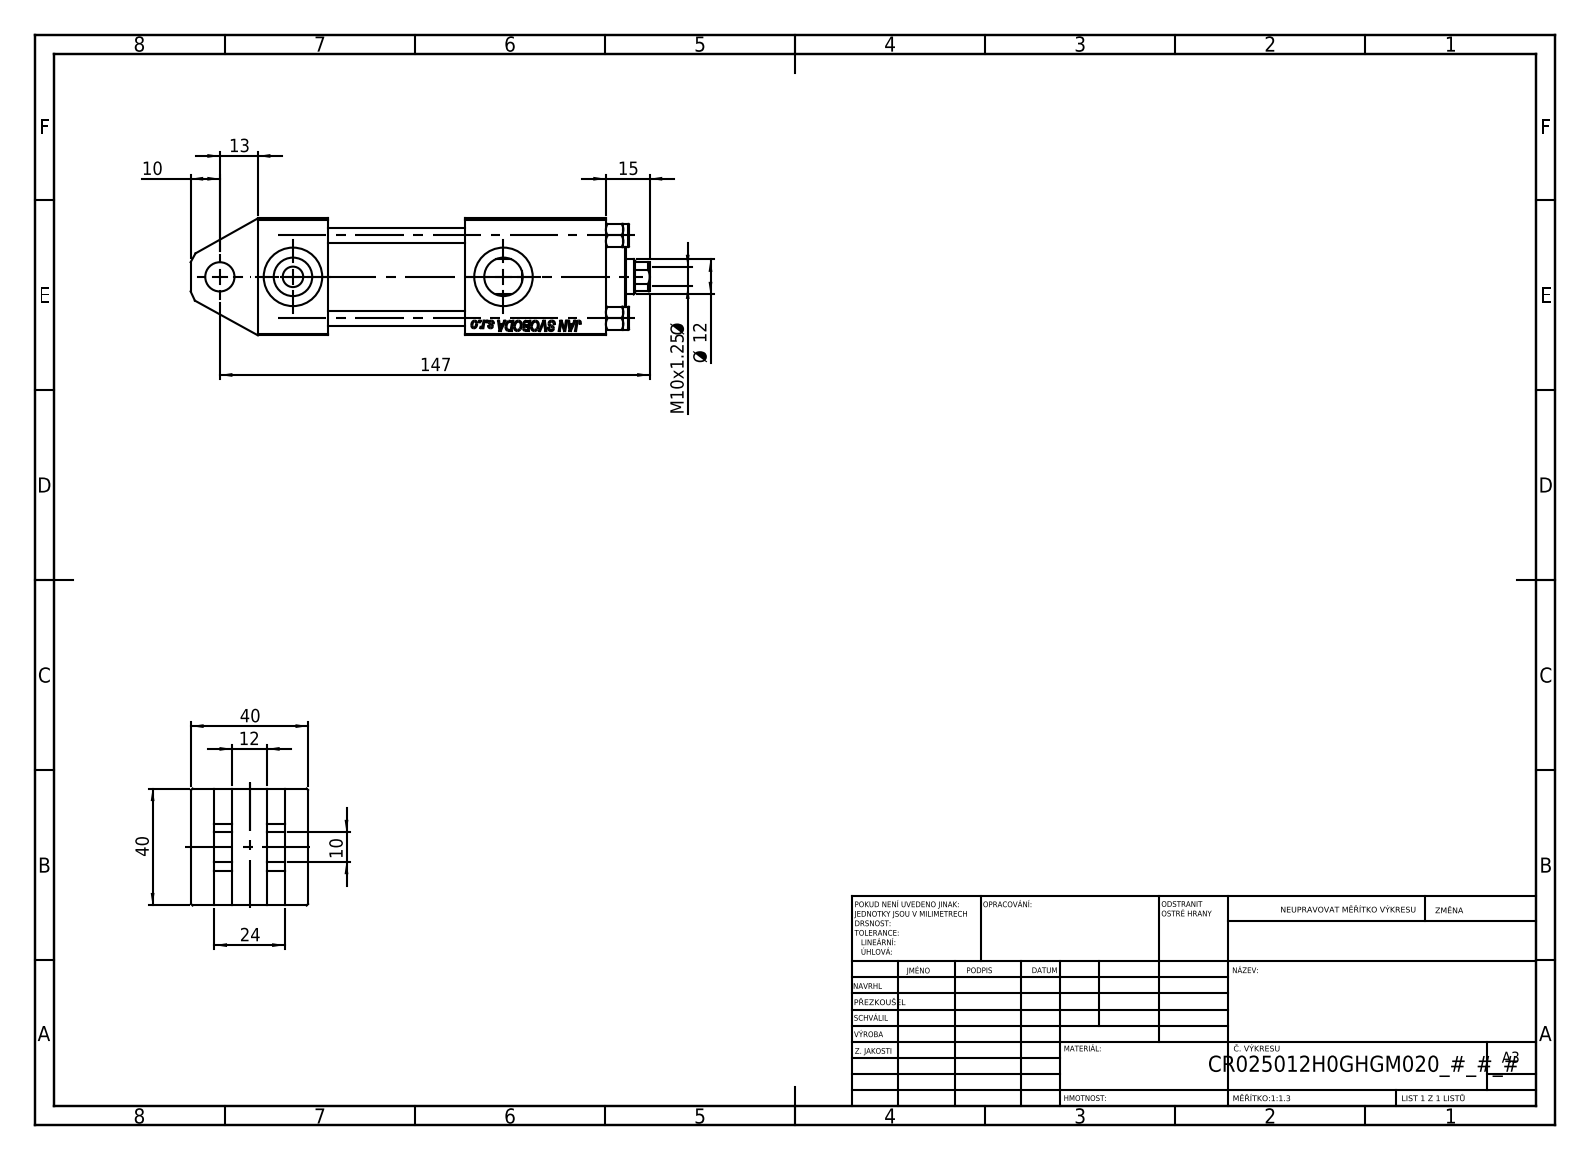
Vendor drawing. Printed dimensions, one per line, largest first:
147
40
40
24
15
13
Ø 12
12
10
M10x1.25 Ø
10
